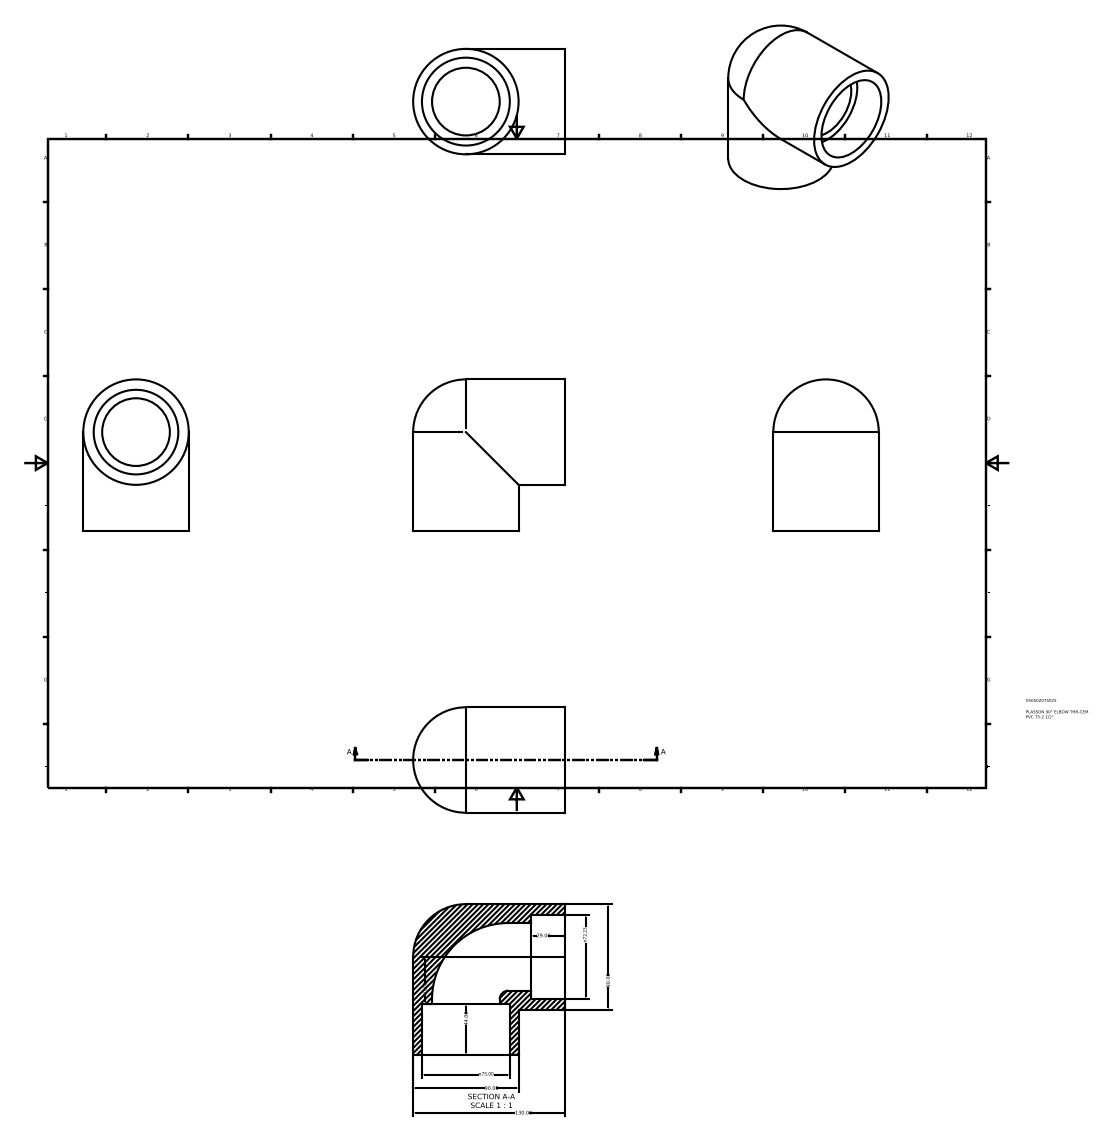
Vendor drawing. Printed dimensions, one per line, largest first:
130.00
90.00
90.00
n75.00
n72.23
44.00
40.00
29.00
